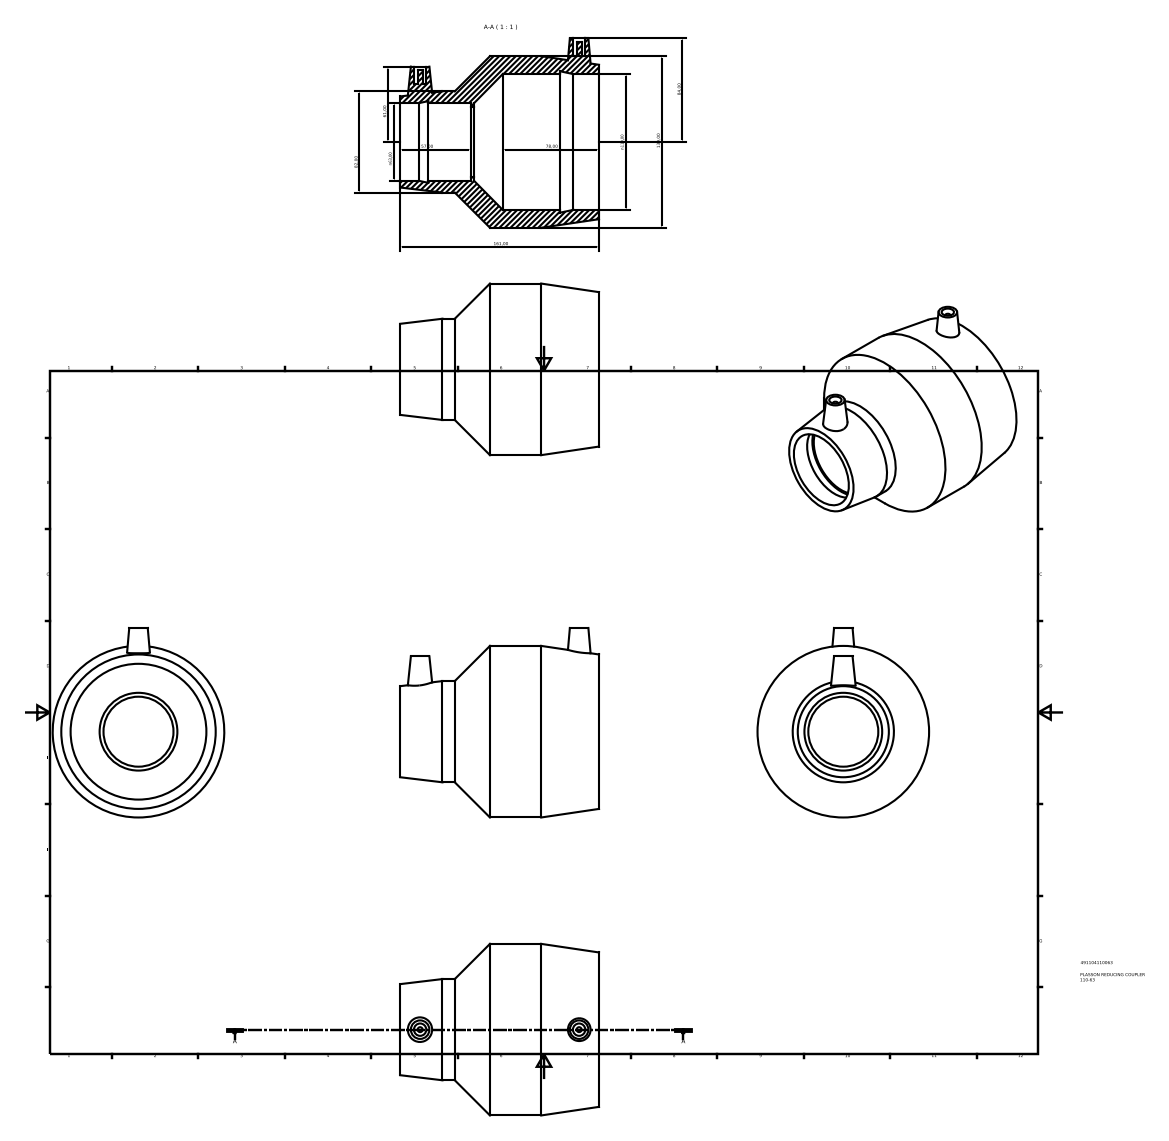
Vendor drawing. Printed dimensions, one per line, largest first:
161,00
139,00
n110,00
84,00
82,00
78,00
n63,00
61,00
57,00
